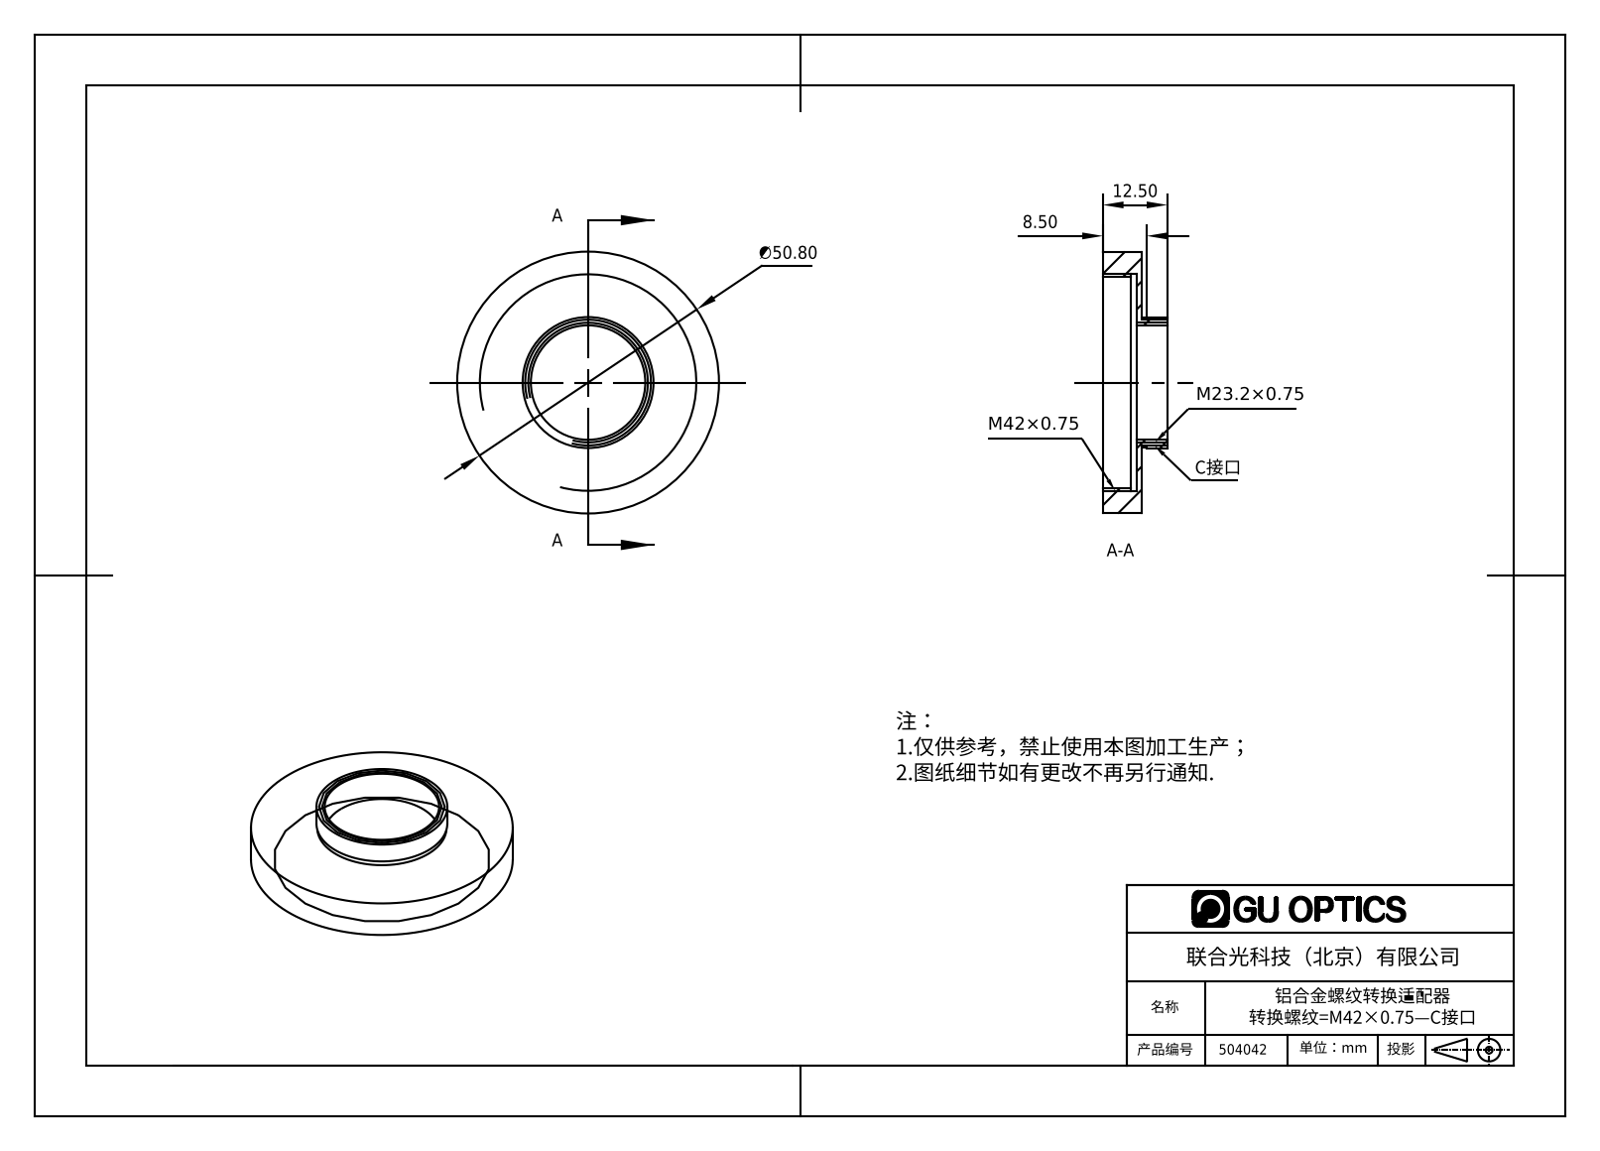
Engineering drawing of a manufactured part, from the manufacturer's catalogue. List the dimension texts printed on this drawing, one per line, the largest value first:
∅50.80
12.50
8.50
